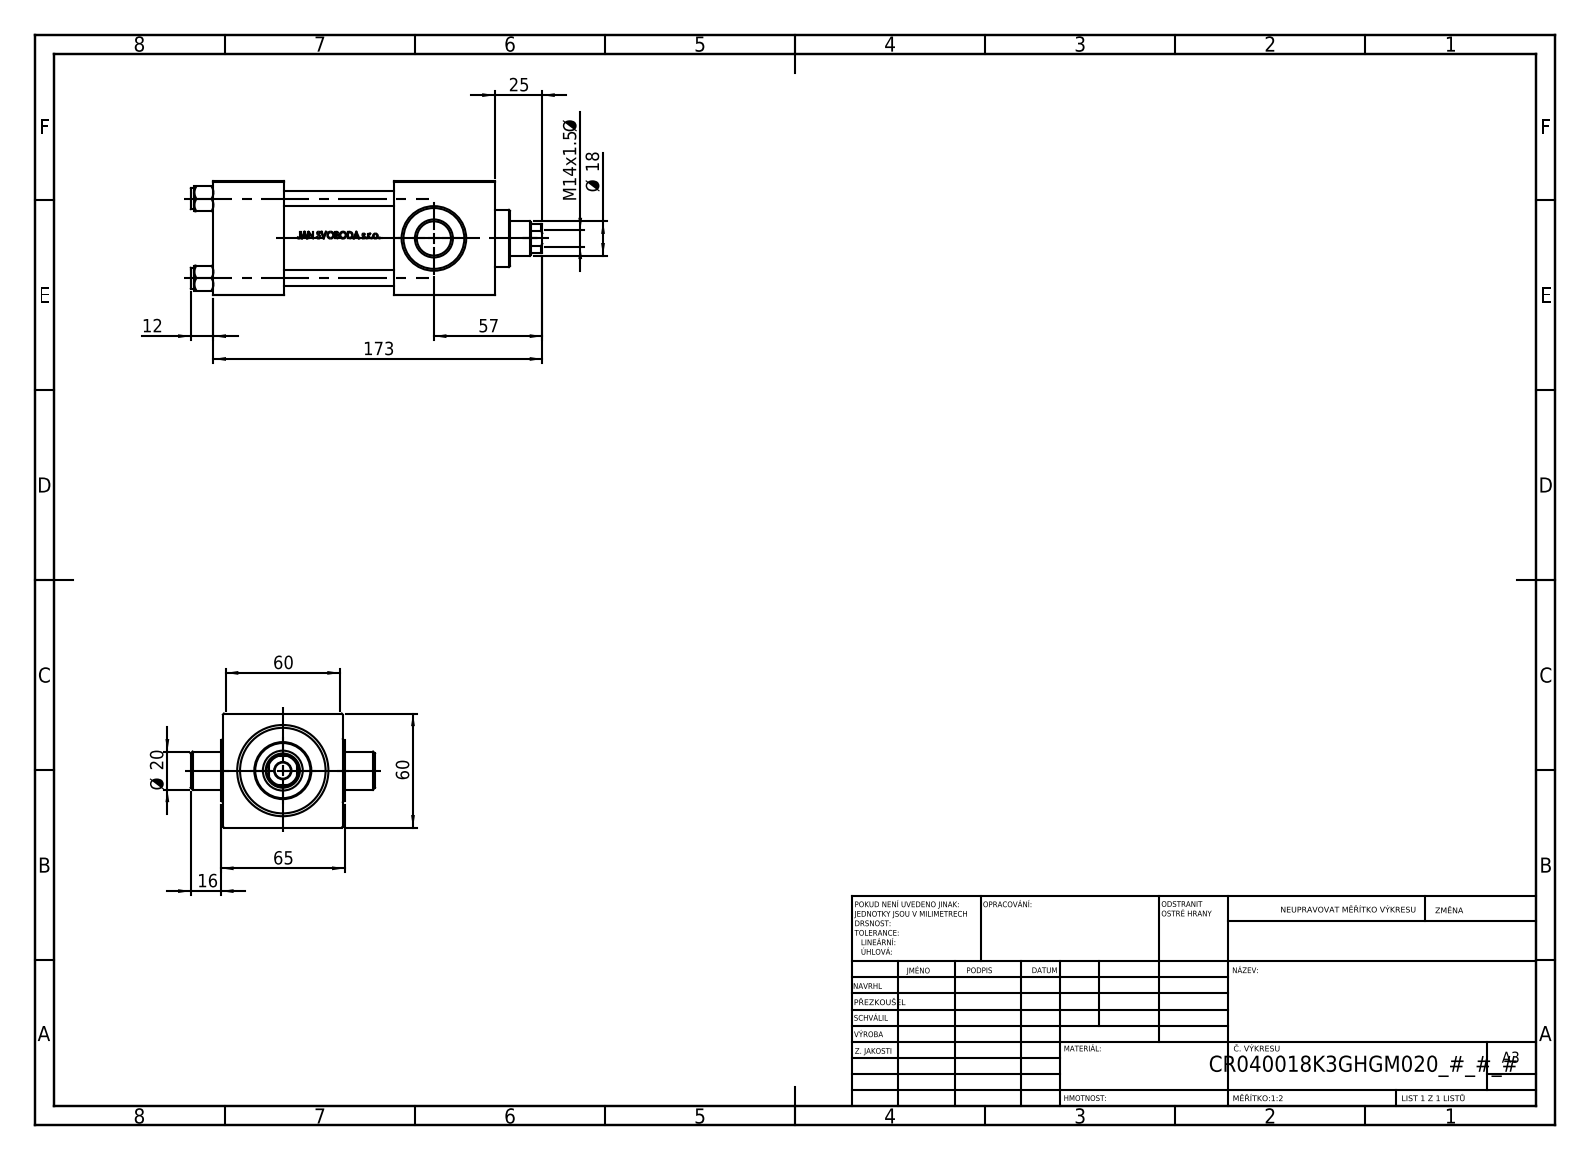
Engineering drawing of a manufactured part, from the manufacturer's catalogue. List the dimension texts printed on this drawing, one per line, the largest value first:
173
65
60
60
57
25
Ø 20
Ø 18
16
M14x1.5 Ø
12
